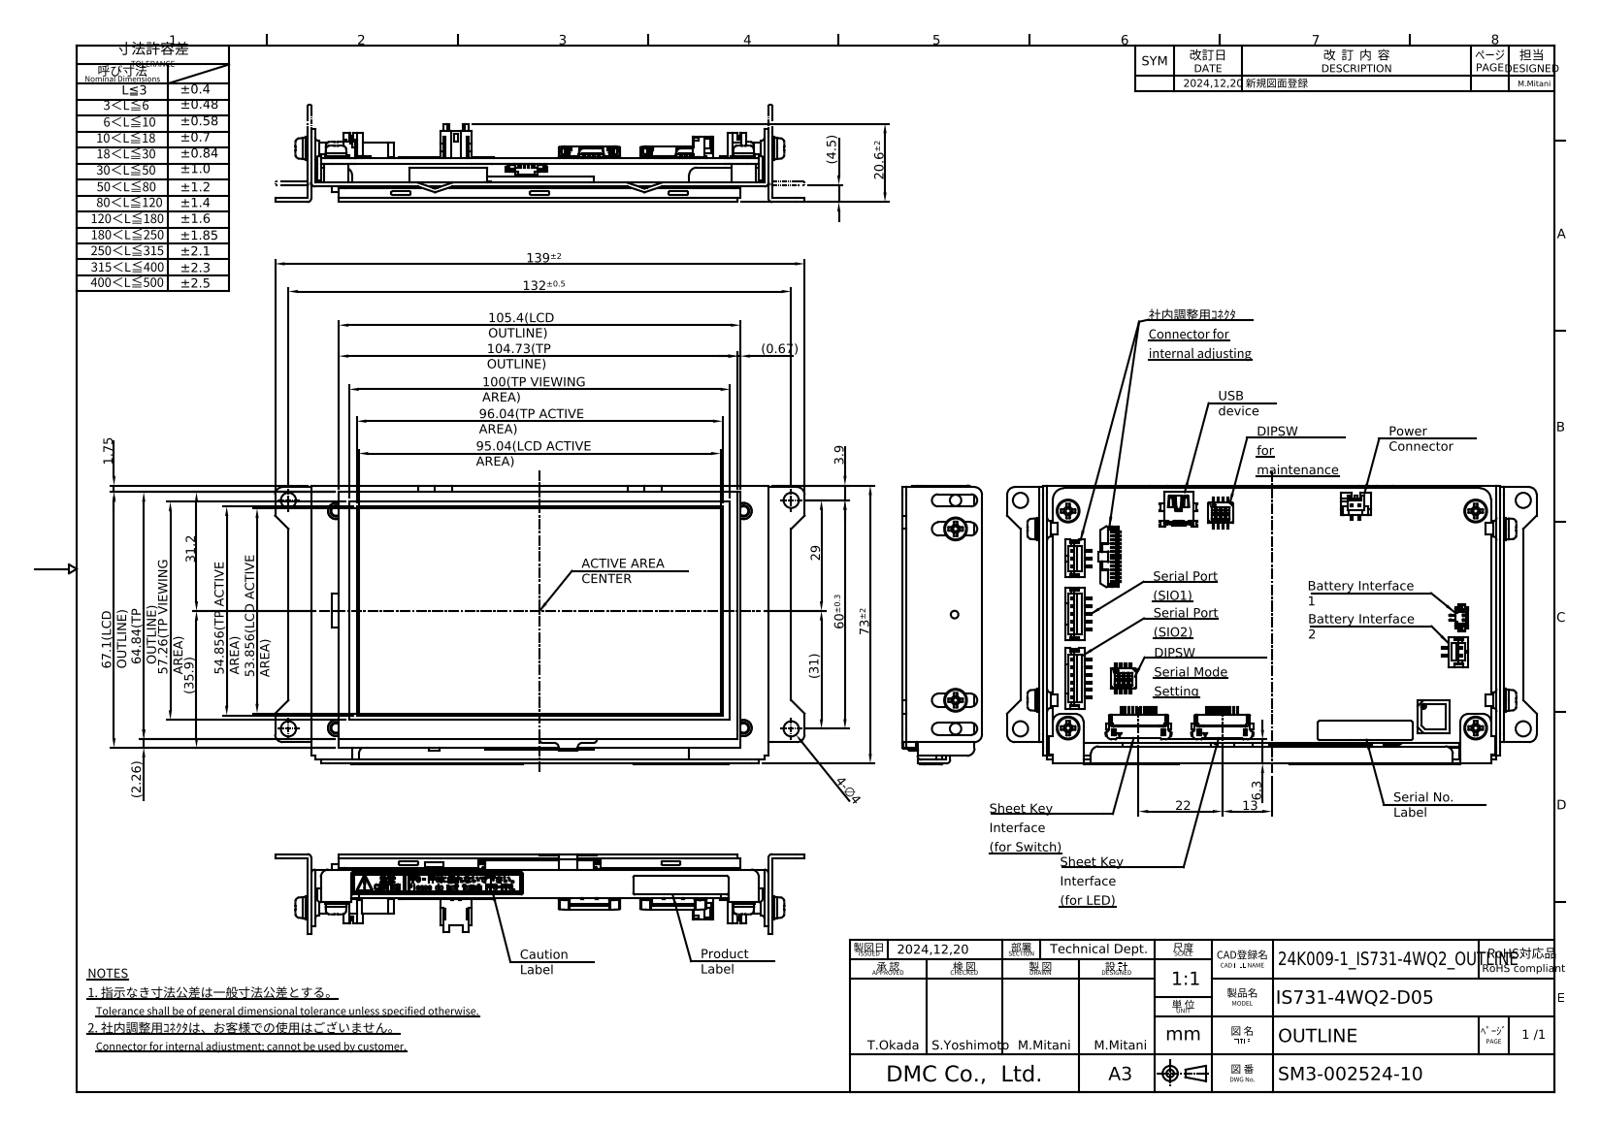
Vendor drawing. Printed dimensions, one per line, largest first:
139±2
132±0.5
105.4(LCD OUTLINE)
104.73(TP OUTLINE)
100(TP VIEWING AREA)
96.04(TP ACTIVE AREA)
95.04(LCD ACTIVE AREA)
73±2
67.1(LCD OUTLINE)
64.84(TP OUTLINE)
60±0.3
57.26(TP VIEWING AREA)
54.856(TP ACTIVE AREA)
53.856(LCD ACTIVE AREA)
(35.9)
31.2
(31)
29
22
20.6±2
13
6.3
(4.5)
4-∅4
3.9
(2.26)
1.75
(0.67)
